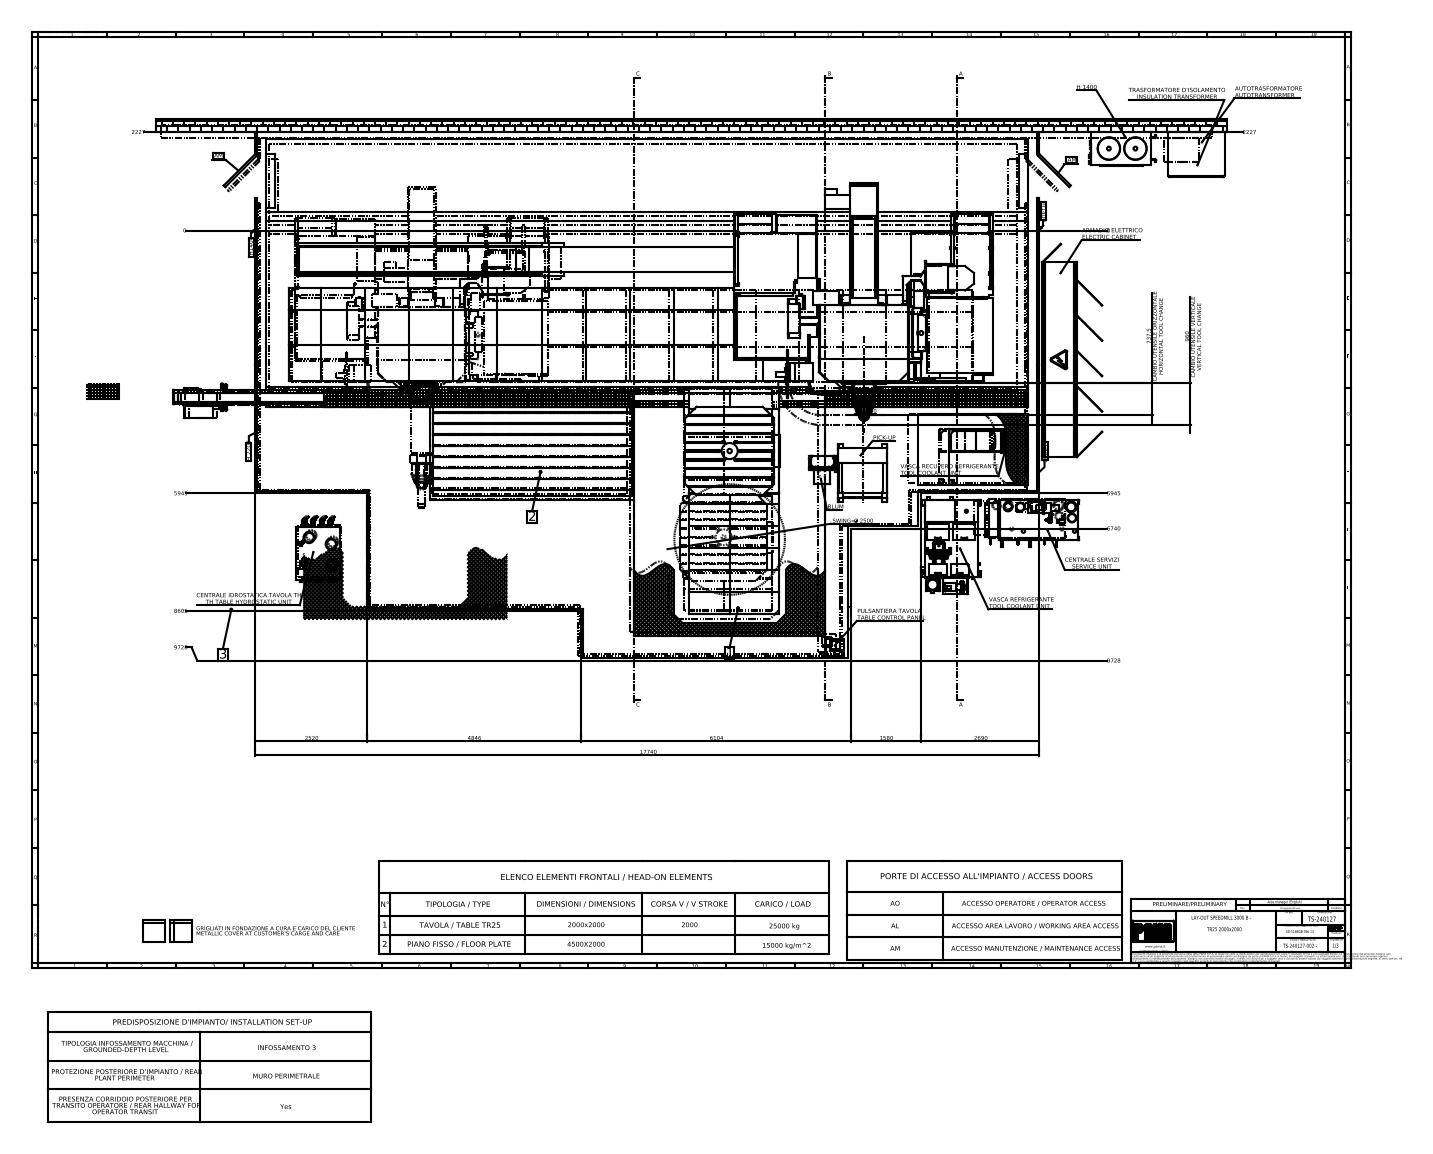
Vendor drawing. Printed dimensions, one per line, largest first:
17740
9728
9728
8605
6740
6104
5945
5945
4846
2690
2520
SWING= Ø 2500
2227
2227
1580
960 CAMBIO UTENSILE VERTICALE VERTICAL TOOL CHANGE
737,5 CAMBIO UTENSILE ORIZZONTALE HORIZONTAL TOOL CHANGE
30
0
0
